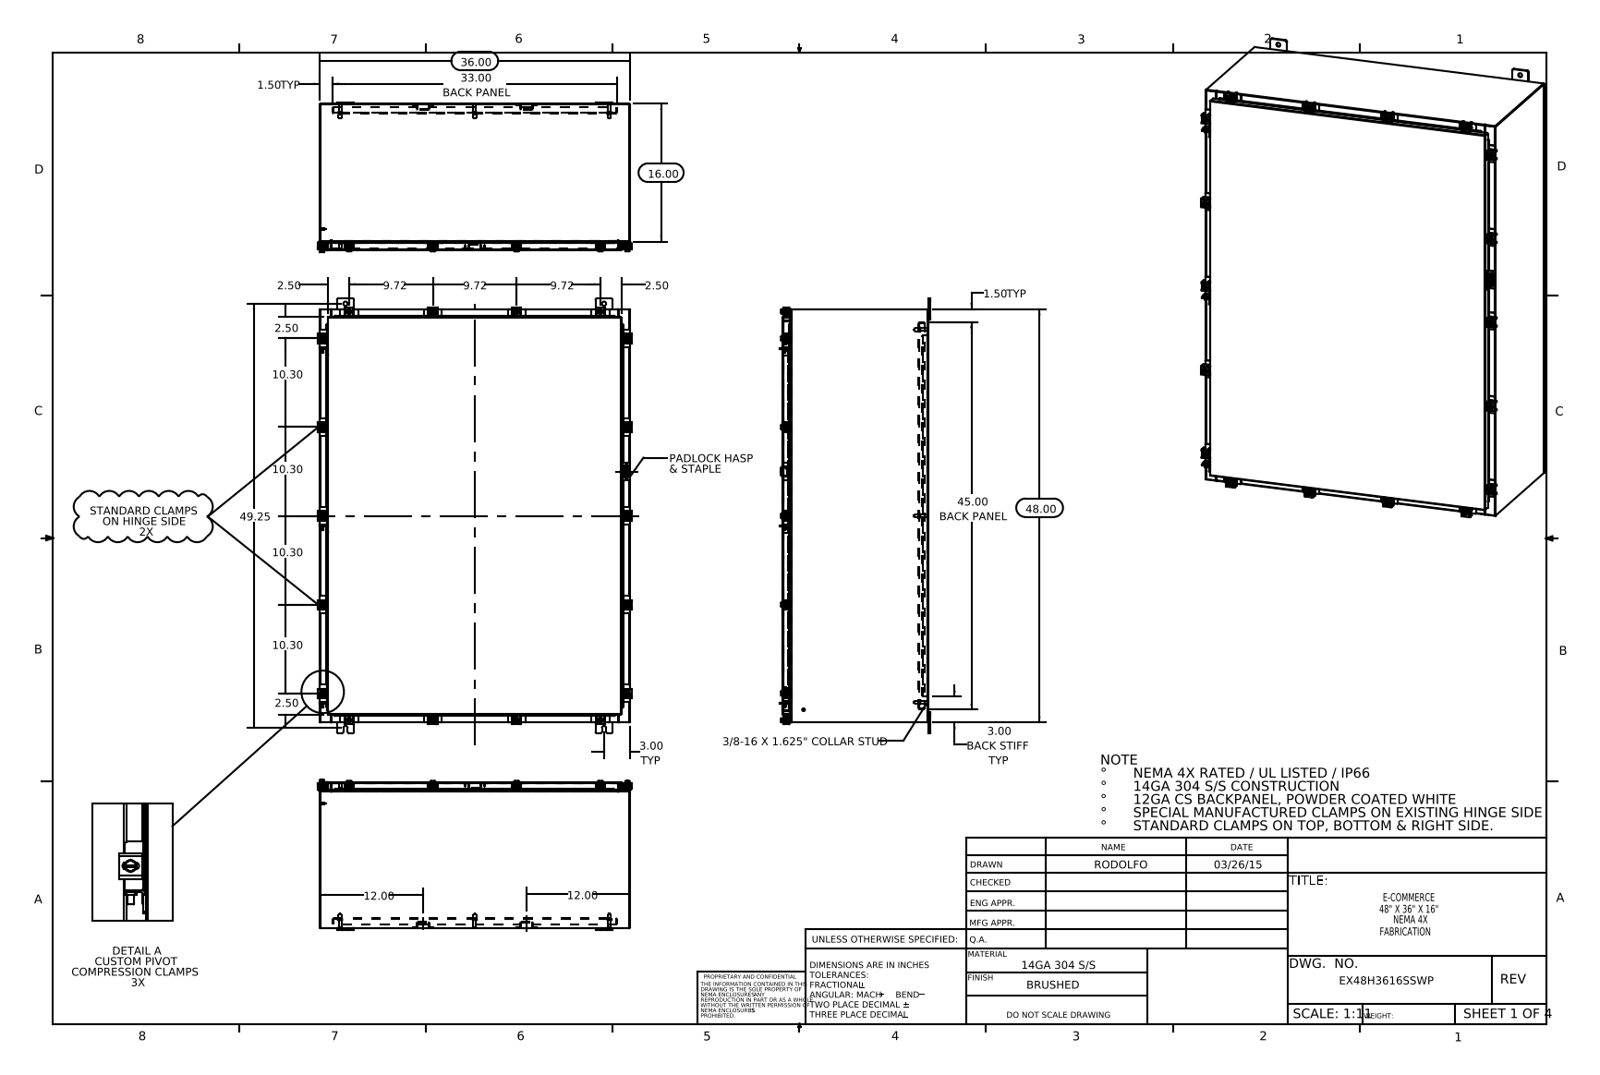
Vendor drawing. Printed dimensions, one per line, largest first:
49.25
48.00
45.00 BACK PANEL
36.00
33.00 BACK PANEL
16.00
12.00
12.00
10.30
10.30
10.30
10.30
9.72
9.72
9.72
3.00 TYP
3.00 BACK STIFF TYP
2.50
2.50
2.50
2.50
1.50 TYP
1.50 TYP
